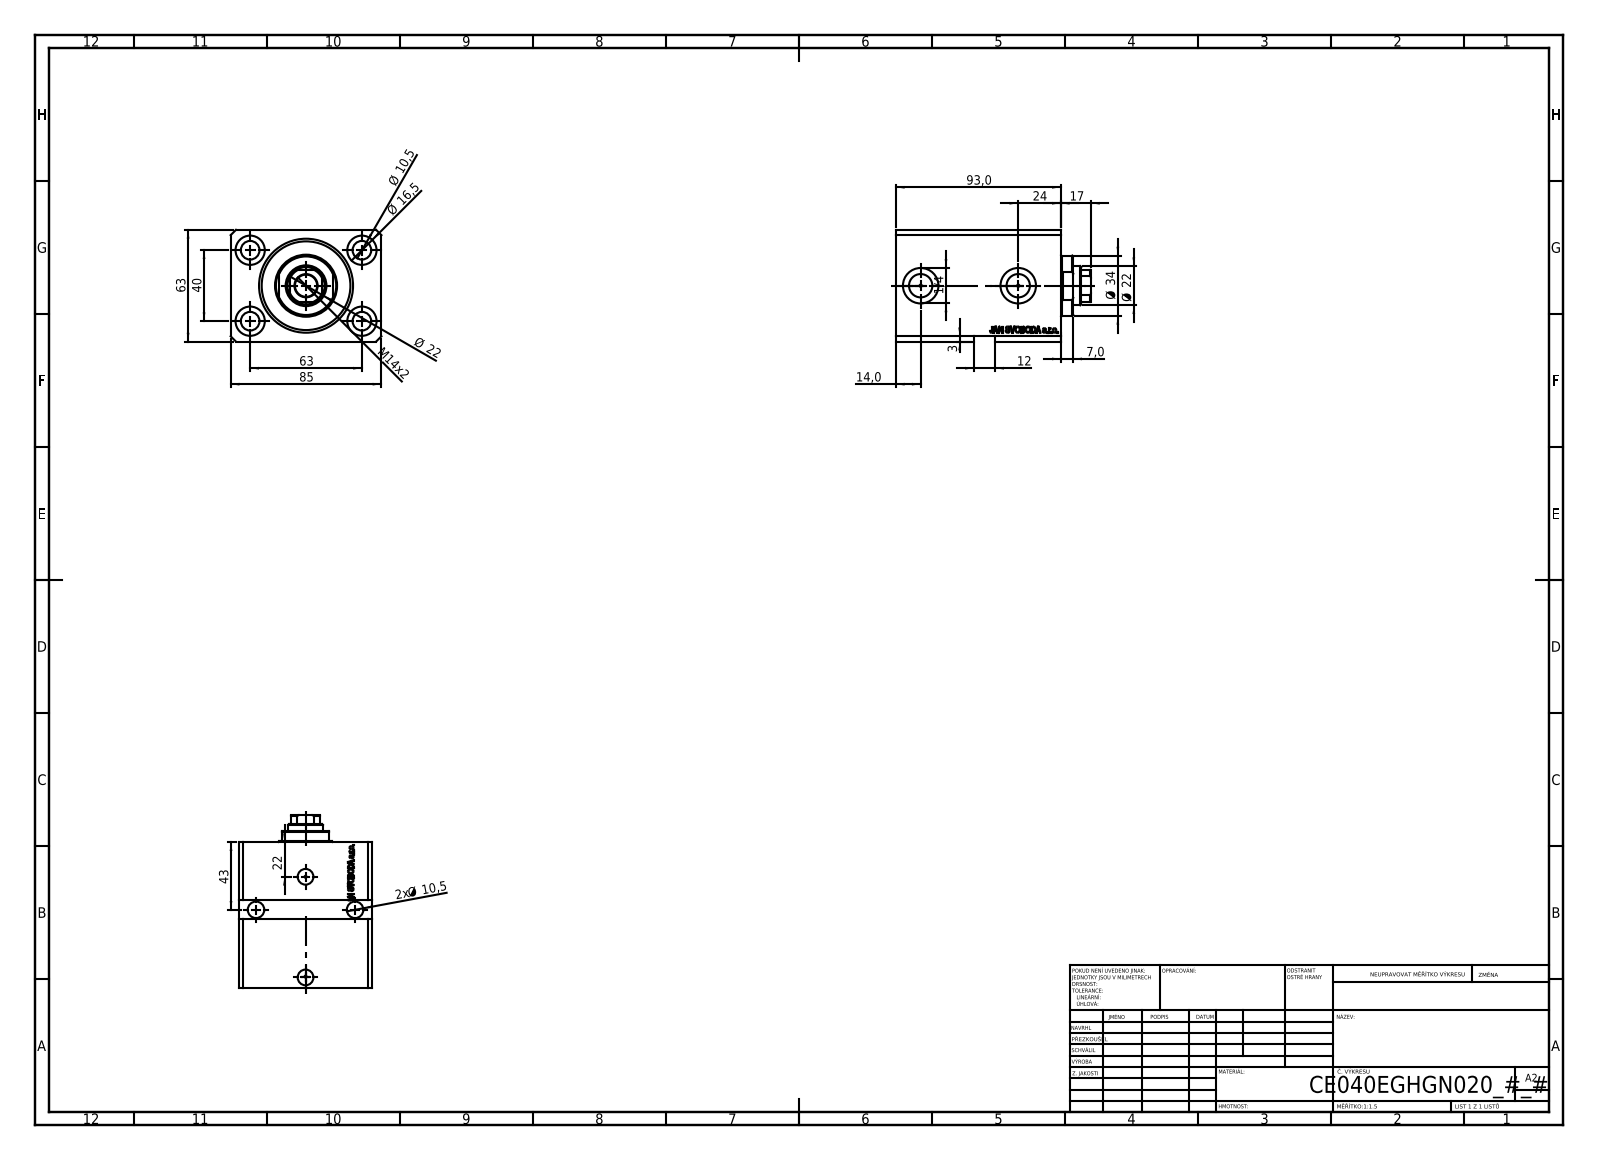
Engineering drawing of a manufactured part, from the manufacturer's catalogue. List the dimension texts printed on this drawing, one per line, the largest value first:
93,0
85
63
63
43
40
Ø 34
24
Ø 22
Ø 22
22
17
Ø 16,5
M14x2
14,0
12
Ø 10,5
2x Ø 10,5
7,0
3
1/4
